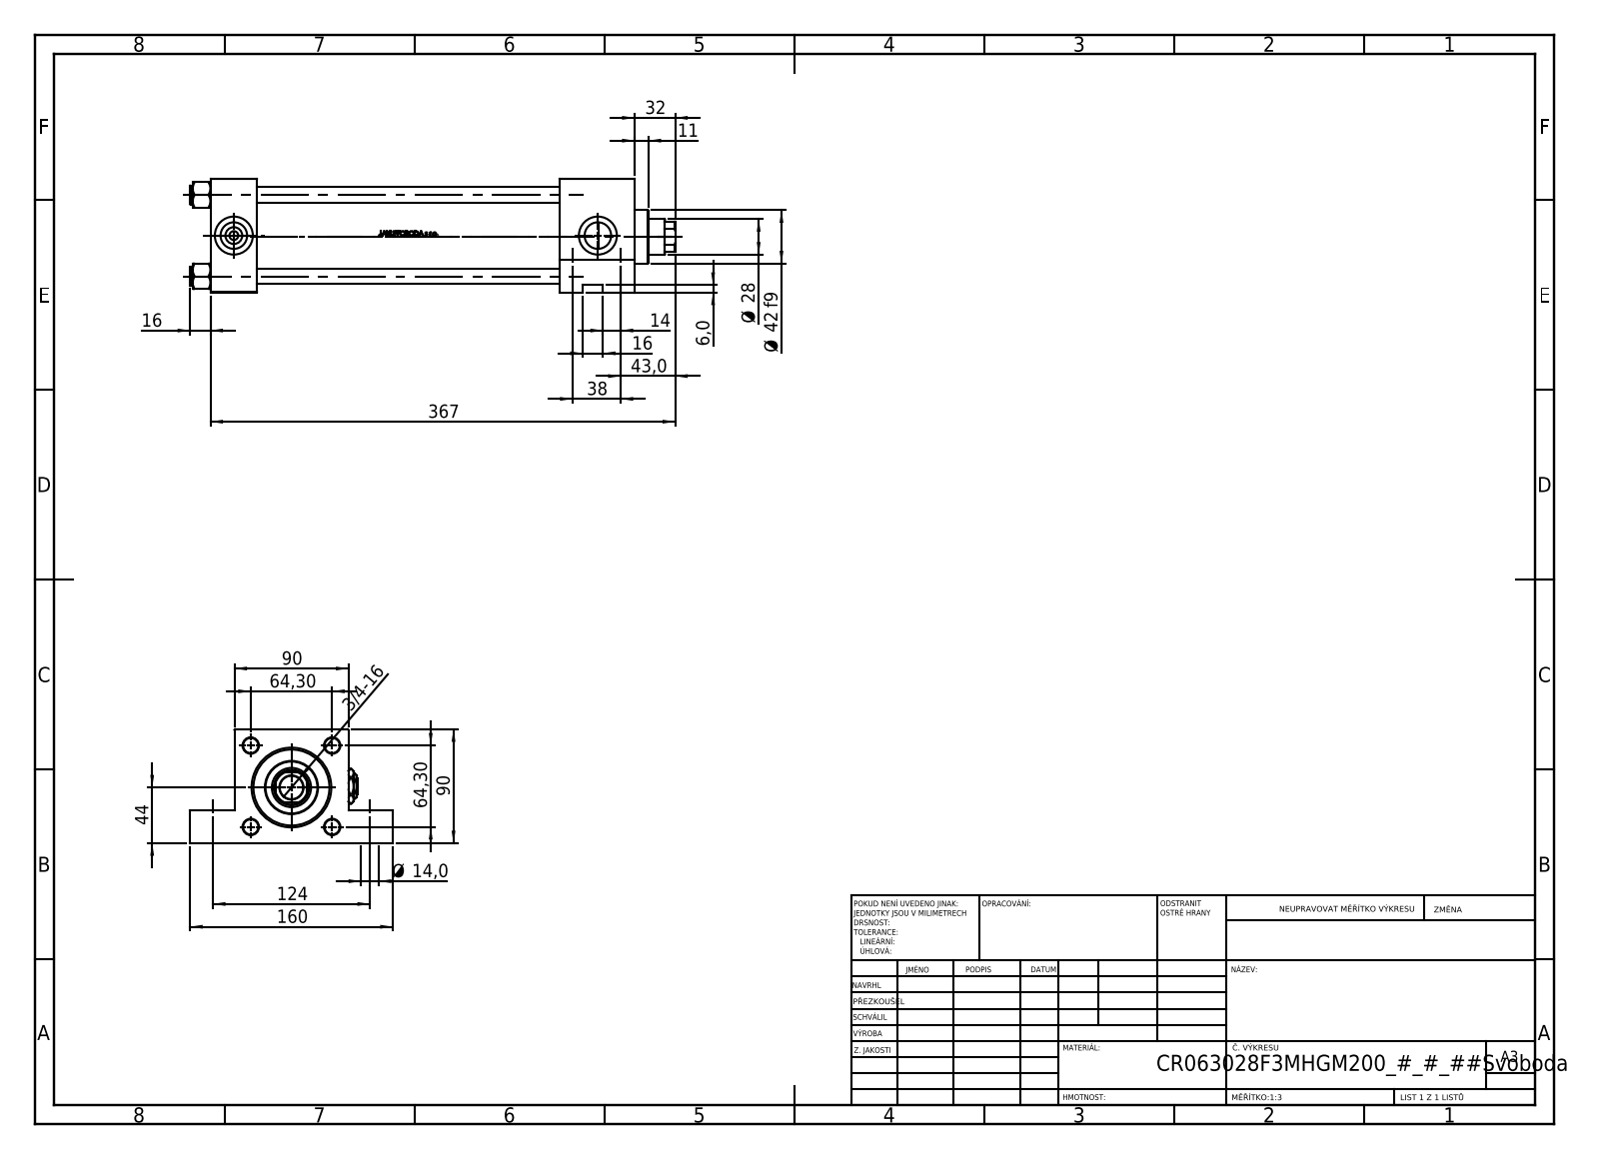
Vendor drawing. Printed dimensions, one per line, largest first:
367
160
124
90
90
64,30
64,30
44
43,0
Ø 42 f9
38
32
Ø 28
16
16
14
Ø 14,0
11
6,0
3/4-16
